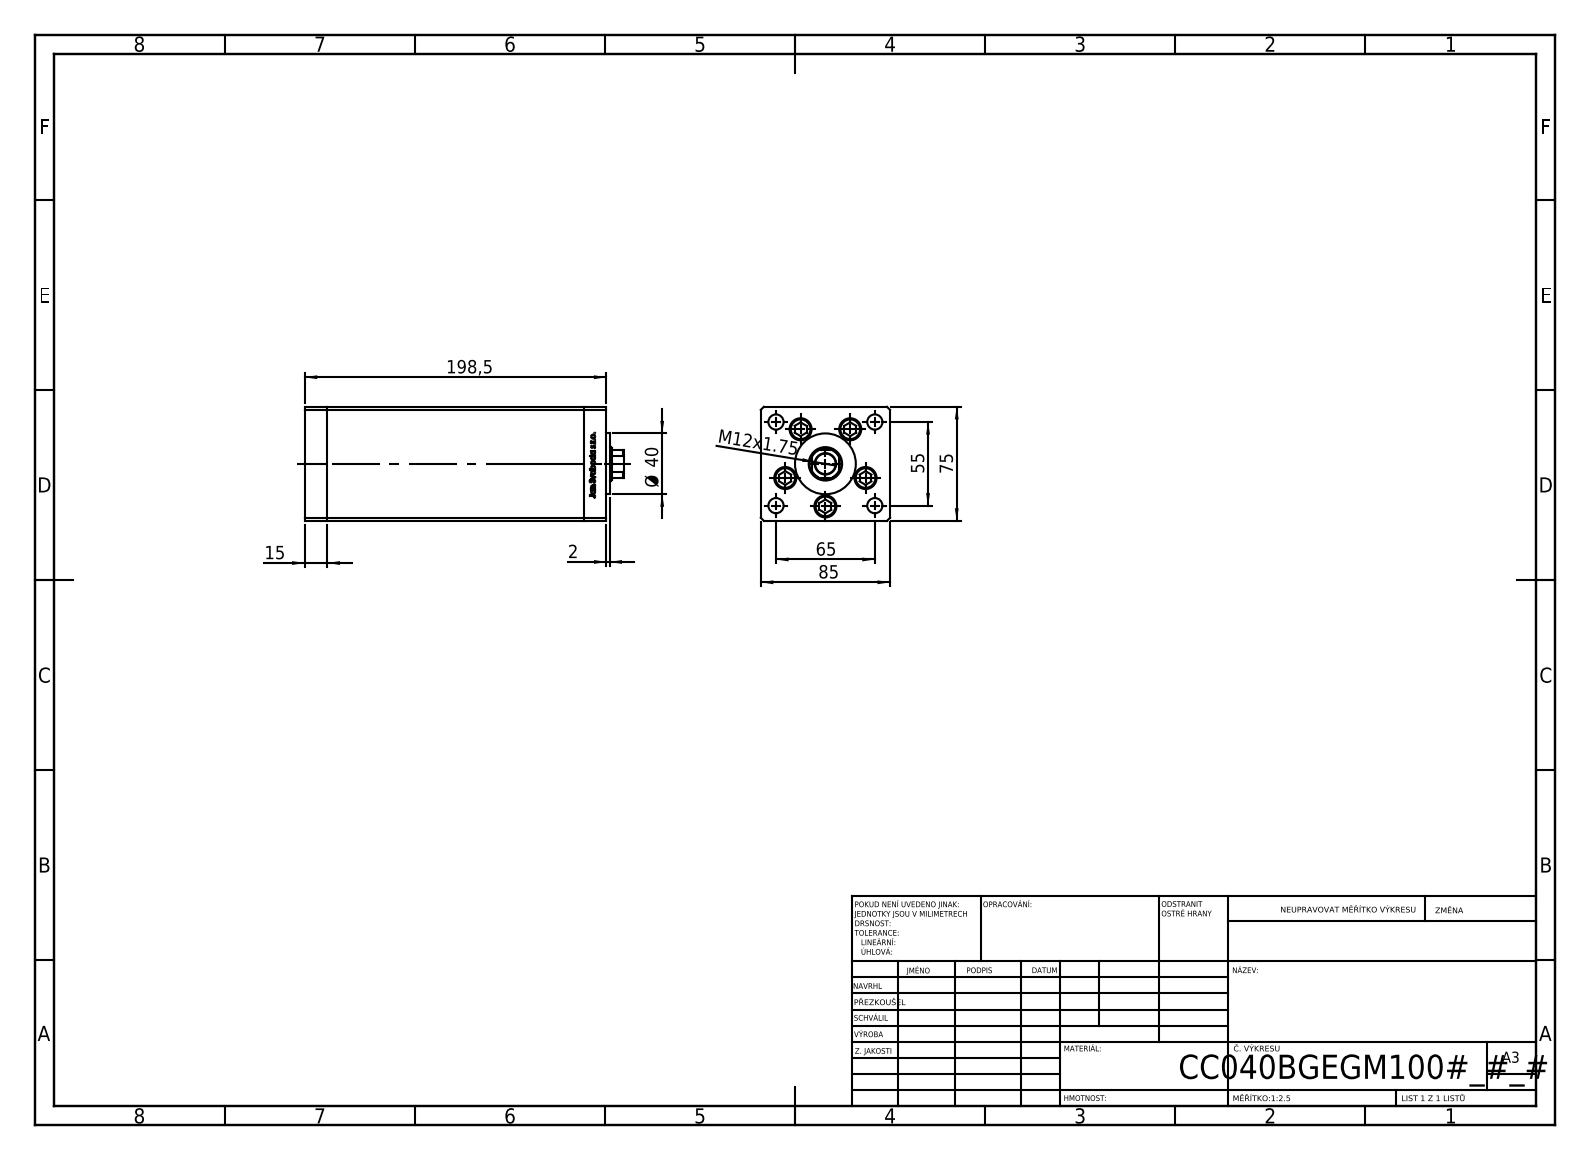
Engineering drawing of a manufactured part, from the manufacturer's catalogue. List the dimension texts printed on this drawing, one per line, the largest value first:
198,5
85
75
65
55
Ø 40
15
M12x1.75
2
